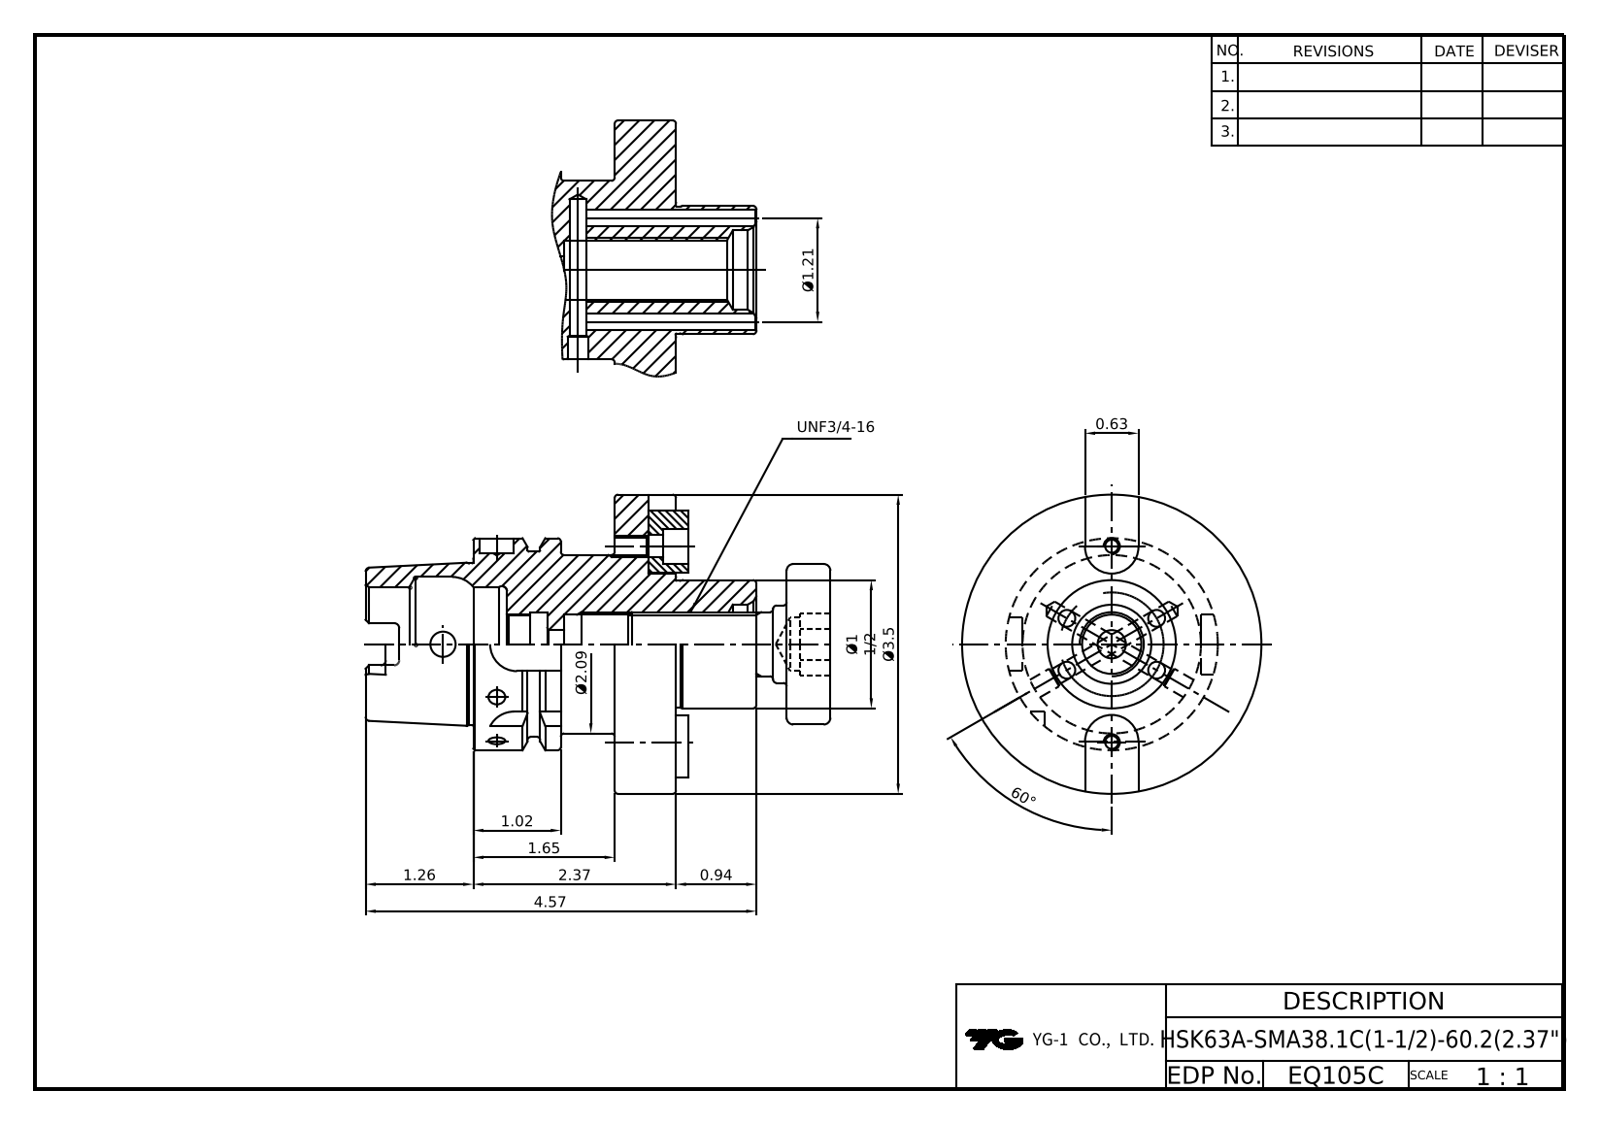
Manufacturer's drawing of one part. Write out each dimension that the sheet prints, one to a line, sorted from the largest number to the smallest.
60°
4.57
Ø3.5
2.37
Ø2.09
1.65
Ø1 1/2
1.26
Ø1.21
1.02
0.94
0.63
